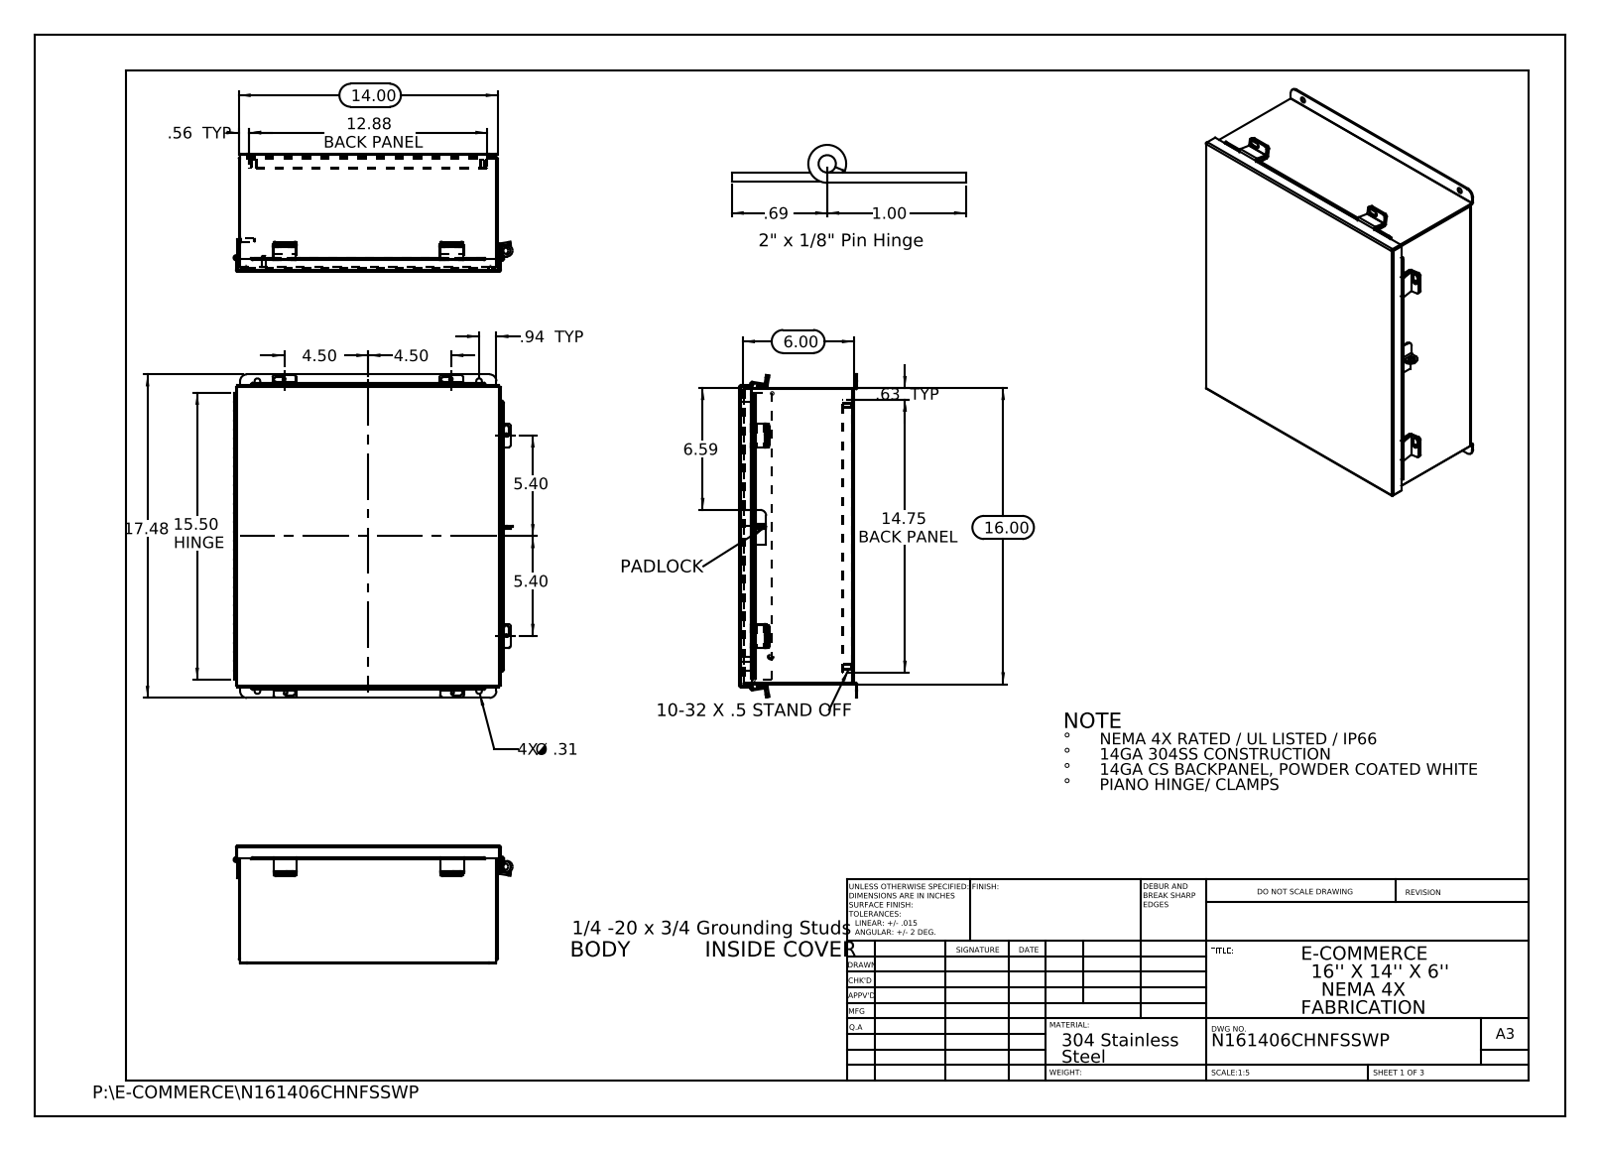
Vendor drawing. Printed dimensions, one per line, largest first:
17.48
16.00
15.50 HINGE
14.75 BACK PANEL
14.00
12.88 BACK PANEL
6.59
6.00
5.40
5.40
4.50
4.50
1.00
.94 TYP
.69
.63 TYP
.56 TYP
4X Ø .31
